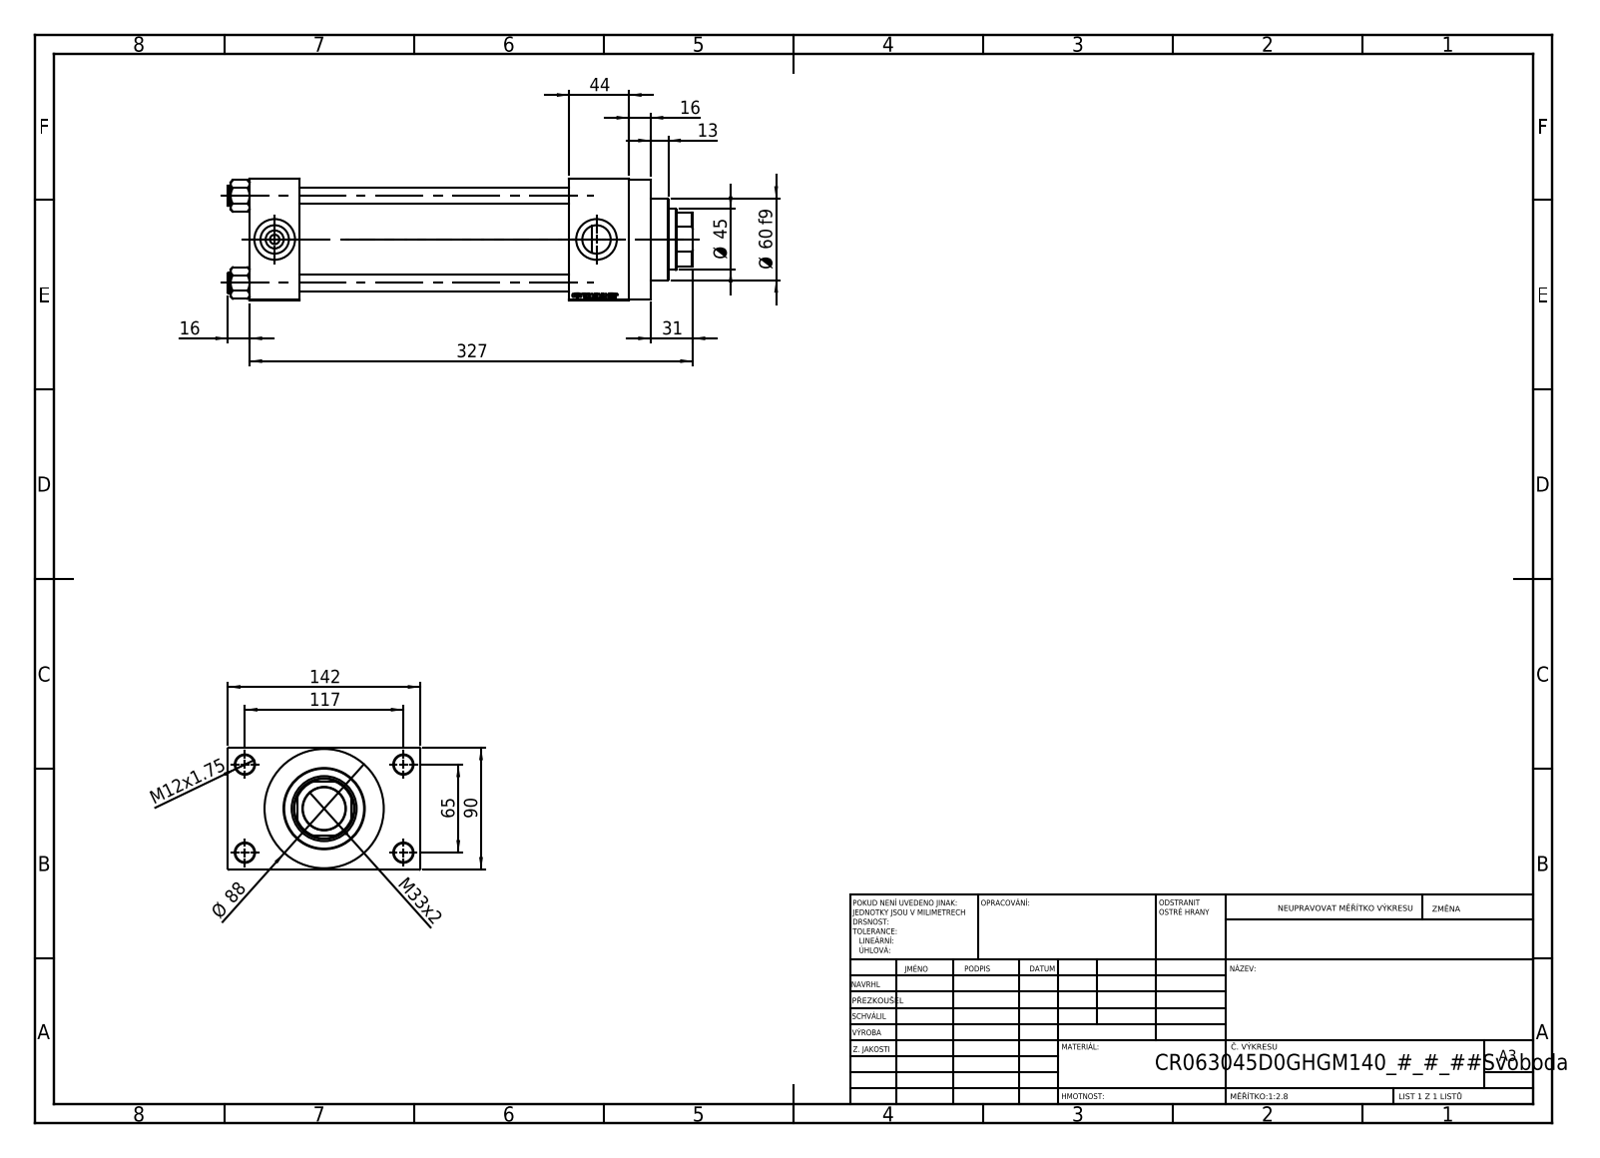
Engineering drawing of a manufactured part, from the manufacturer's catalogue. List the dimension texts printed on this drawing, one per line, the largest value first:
327
142
117
90
Ø 88
65
Ø 60 f9
Ø 45
44
M33x2
31
16
16
13
M12x1.75
